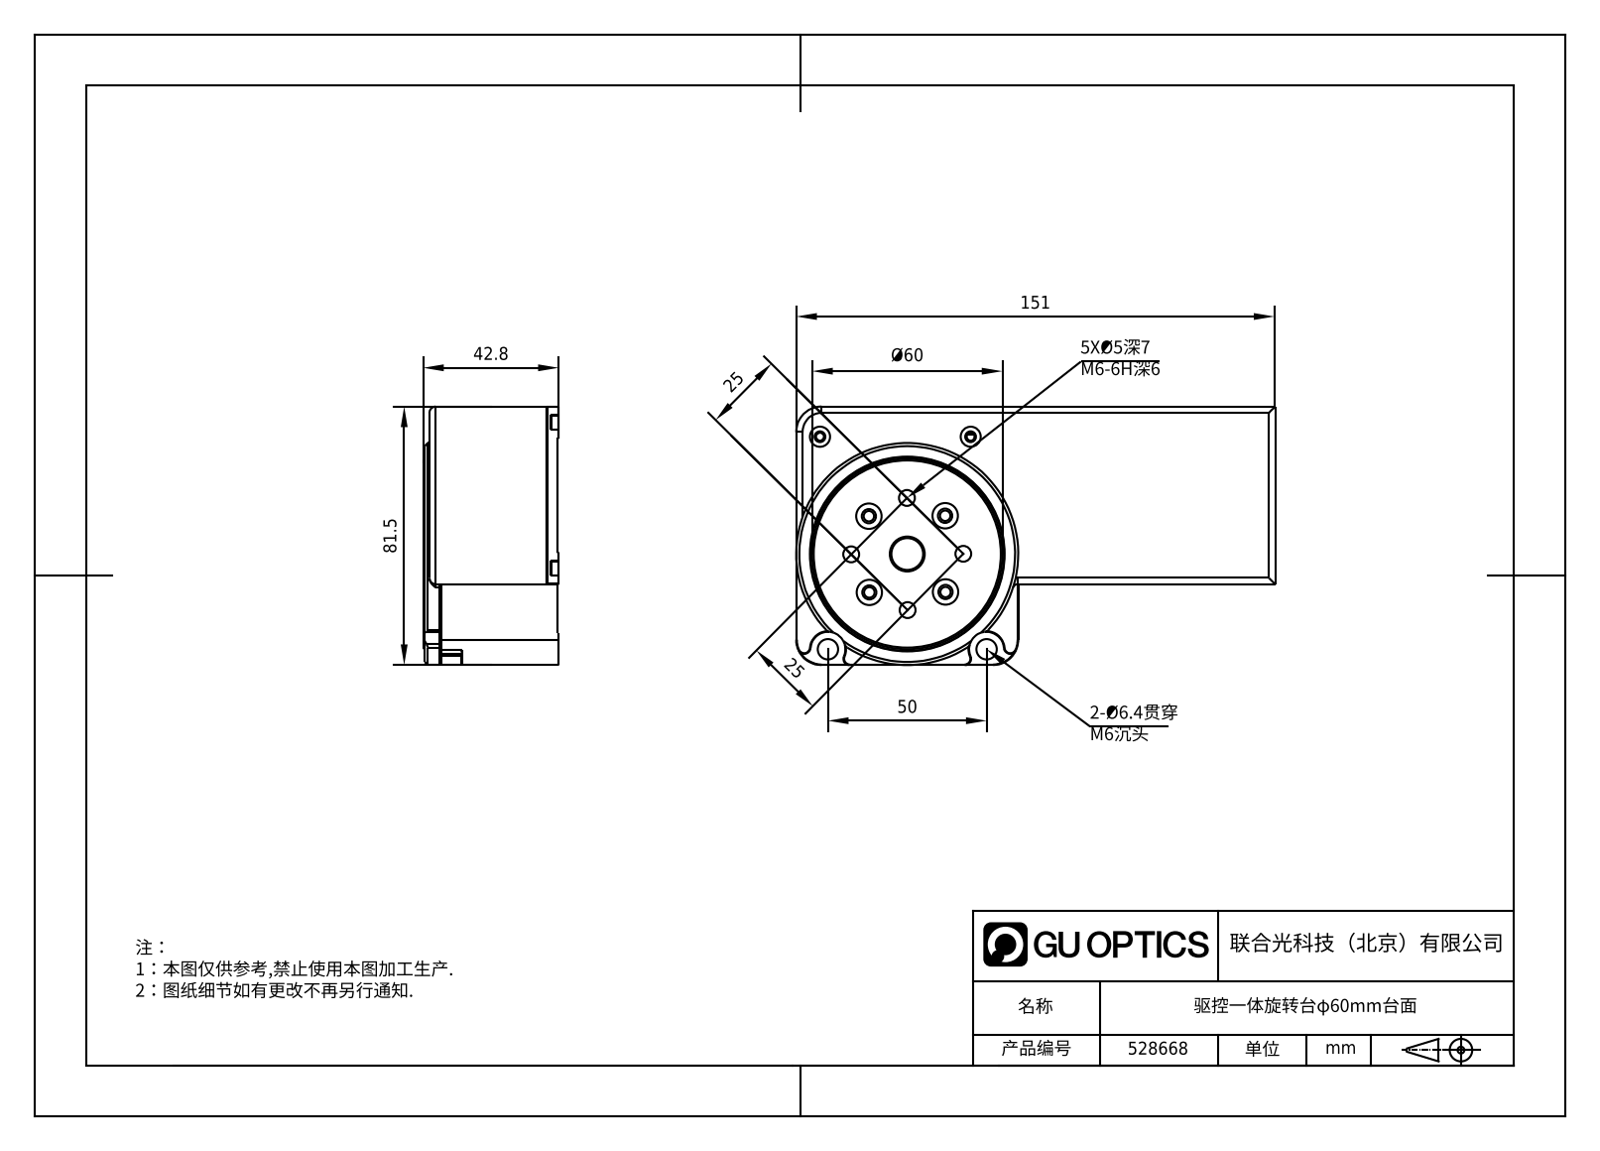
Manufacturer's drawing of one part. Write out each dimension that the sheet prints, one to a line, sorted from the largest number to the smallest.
151
81.5
Ø60
50
42.8
25
25
